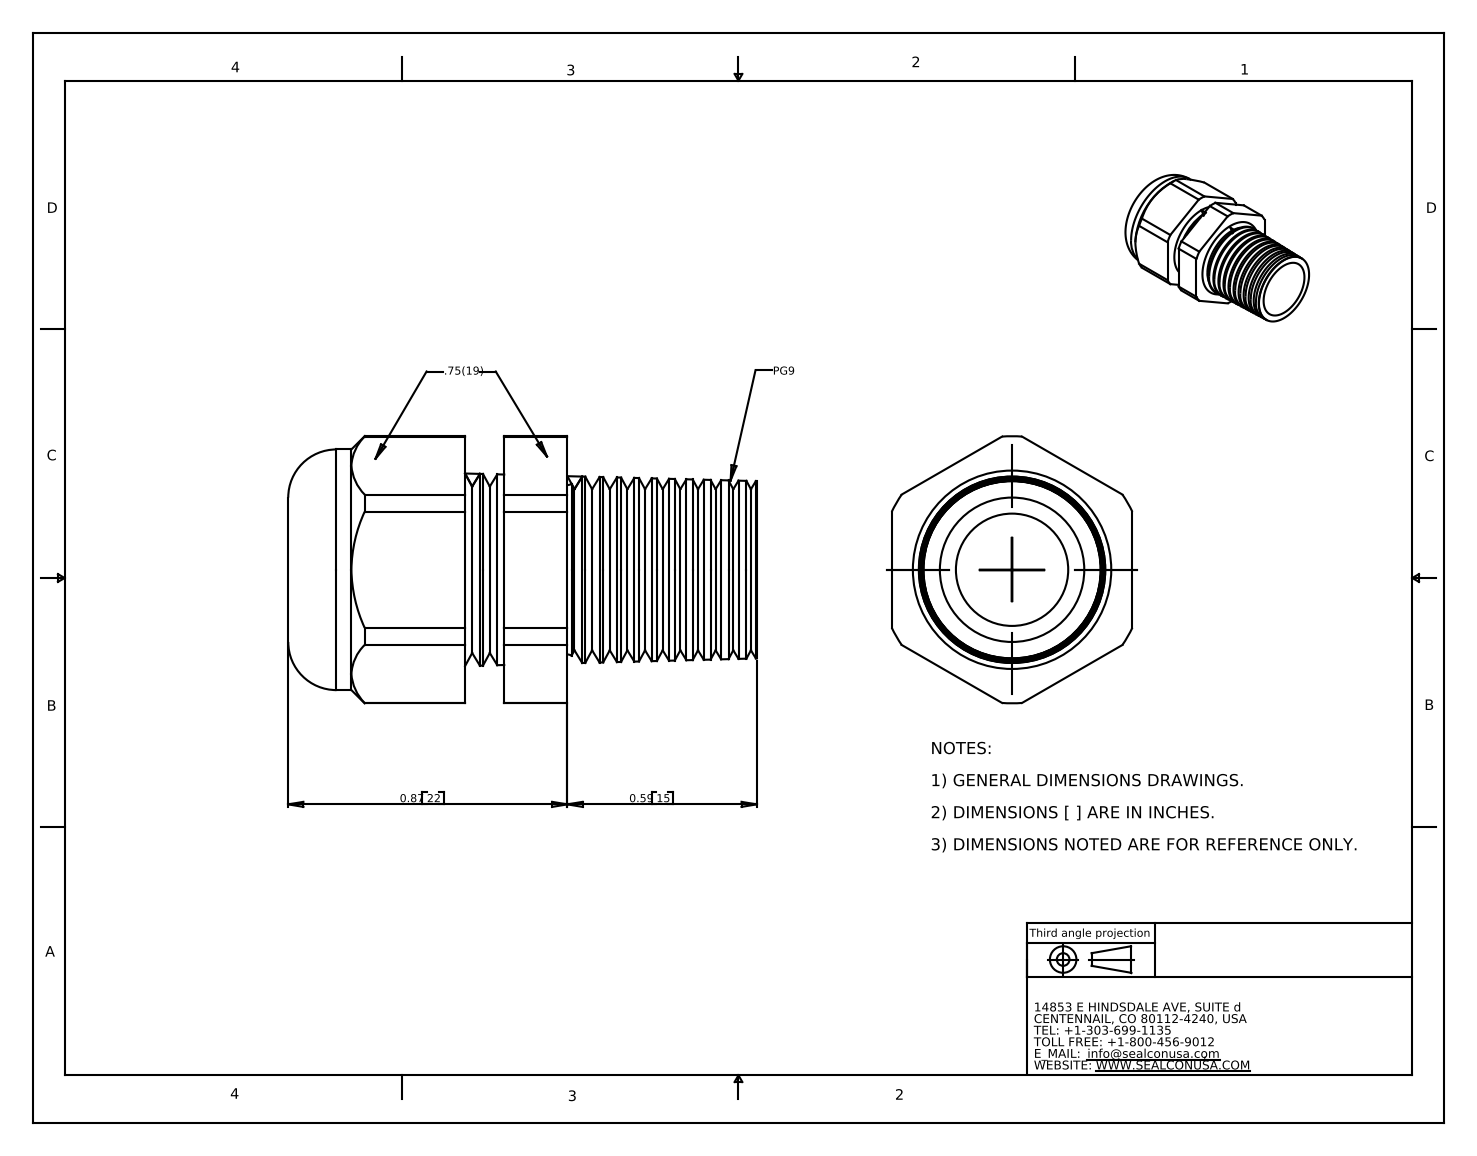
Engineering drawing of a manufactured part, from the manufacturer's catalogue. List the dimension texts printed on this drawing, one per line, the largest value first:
0.87 22
0.59 15
